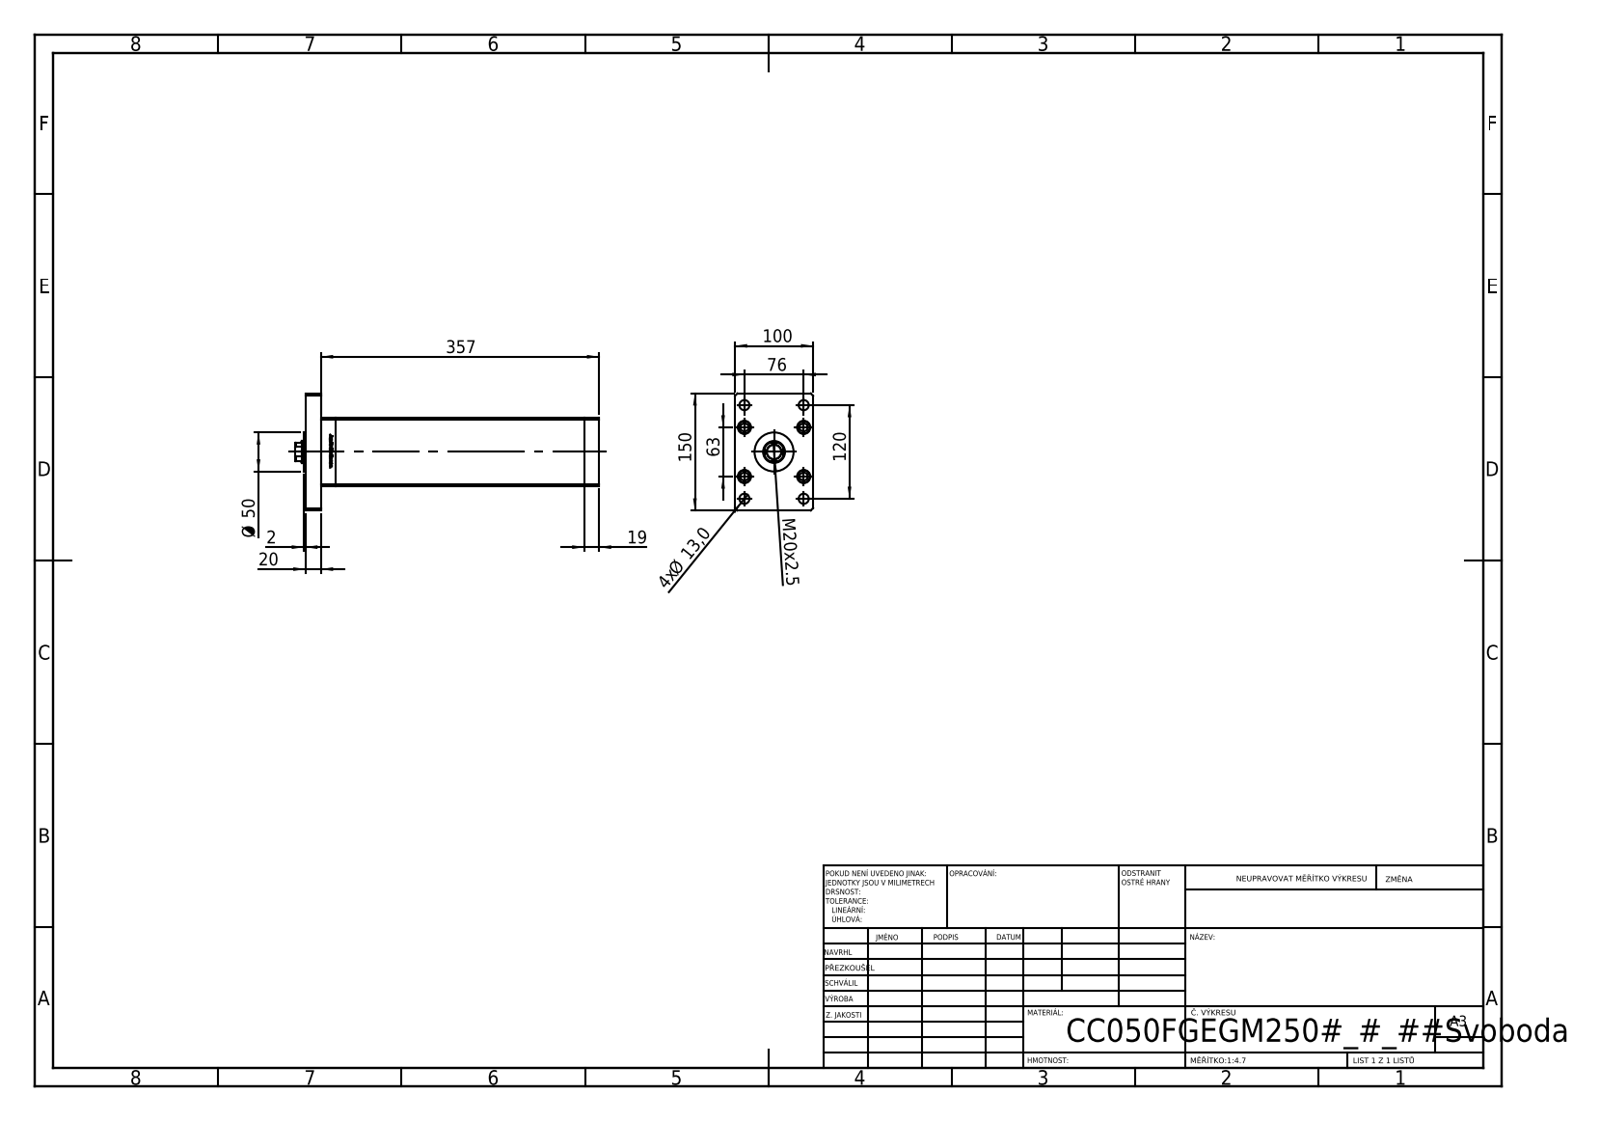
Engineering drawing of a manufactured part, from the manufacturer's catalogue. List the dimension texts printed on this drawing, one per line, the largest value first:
357
150
120
100
76
63
Ø 50
20
M20x2.5
19
4x Ø 13,0
2
